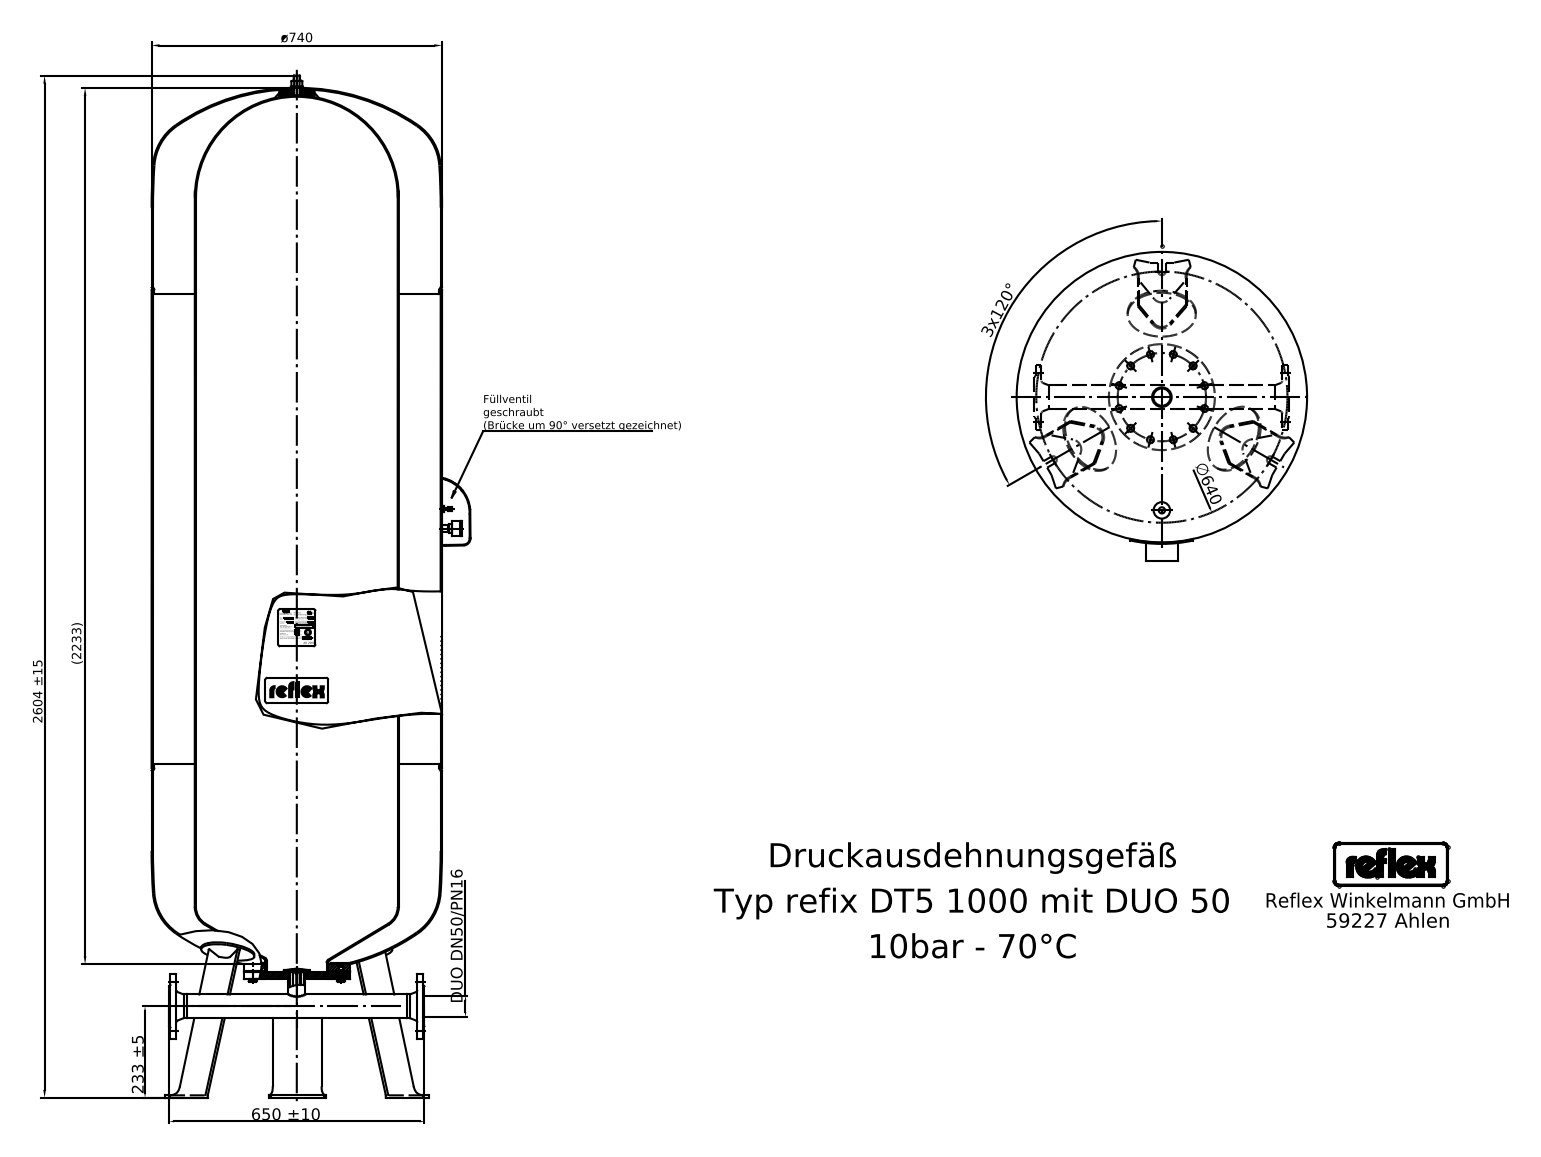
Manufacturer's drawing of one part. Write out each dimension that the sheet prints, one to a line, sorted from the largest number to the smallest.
2604 ±15
(2233)
ø740
650 ±10
∅640
233 ±5
3x120°
DUO DN50/PN16
